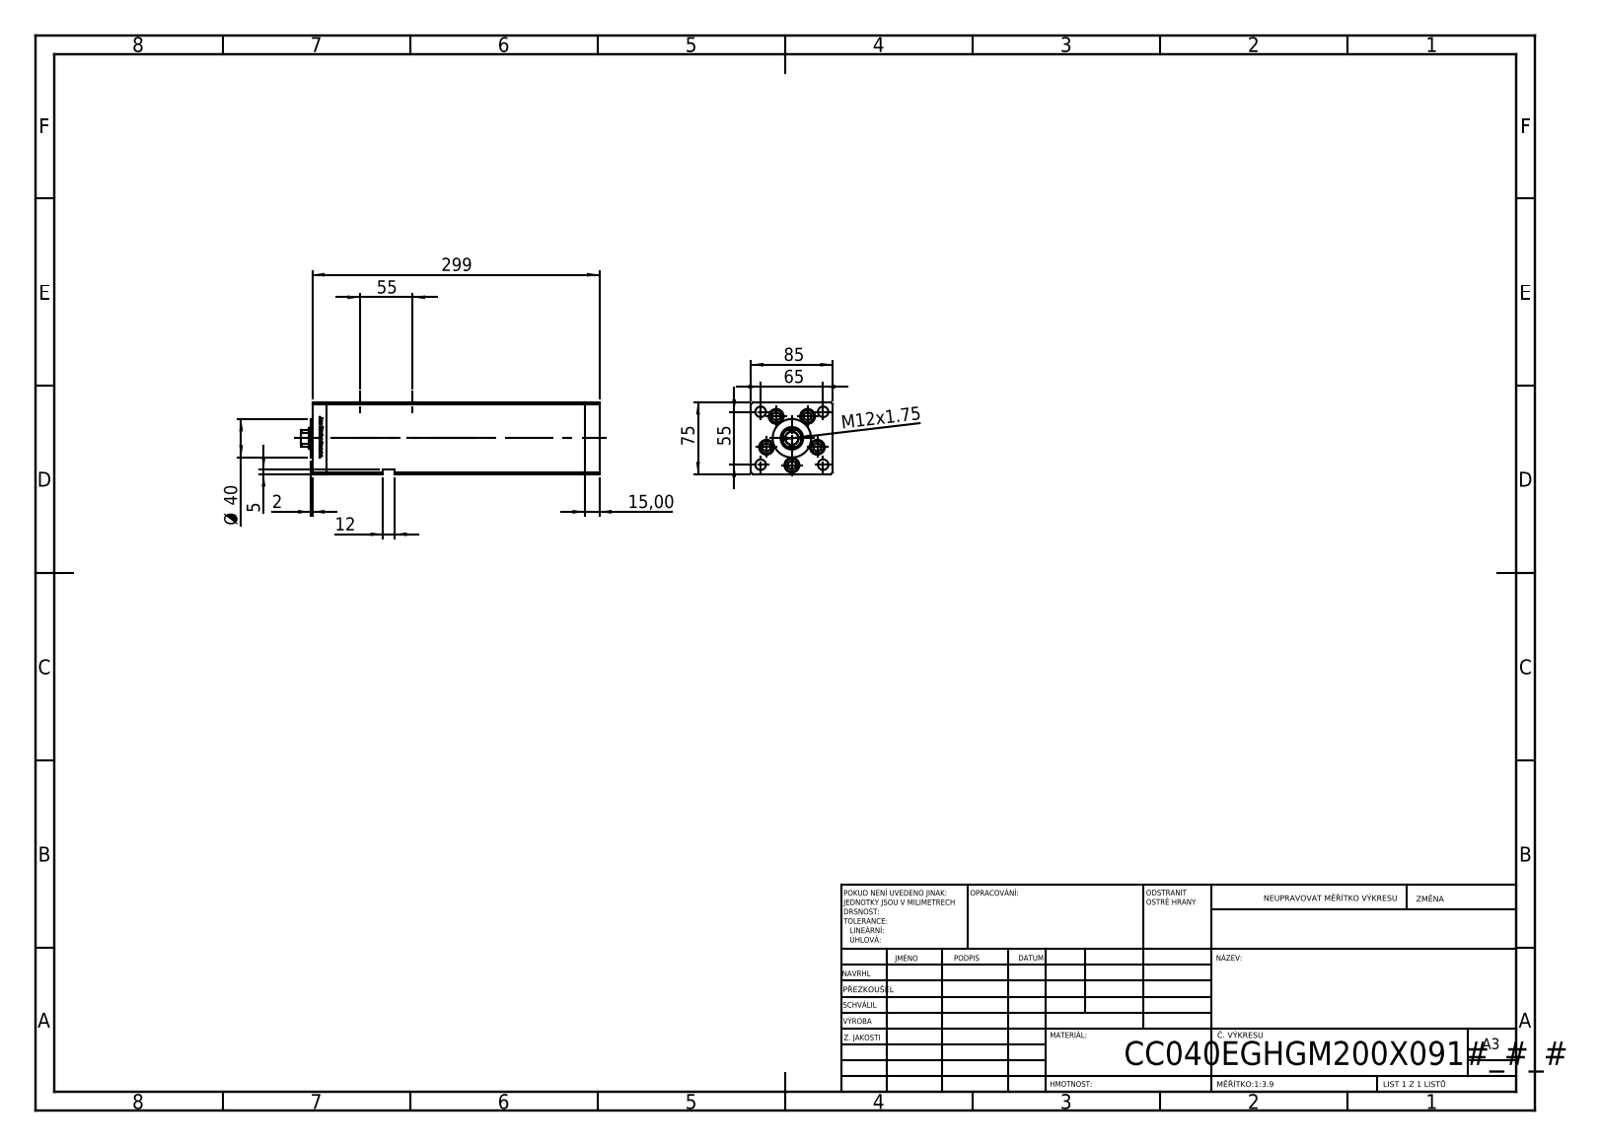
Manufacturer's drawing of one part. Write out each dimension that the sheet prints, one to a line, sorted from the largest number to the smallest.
299
85
75
65
55
55
Ø 40
15,00
12
M12x1.75
5
2
